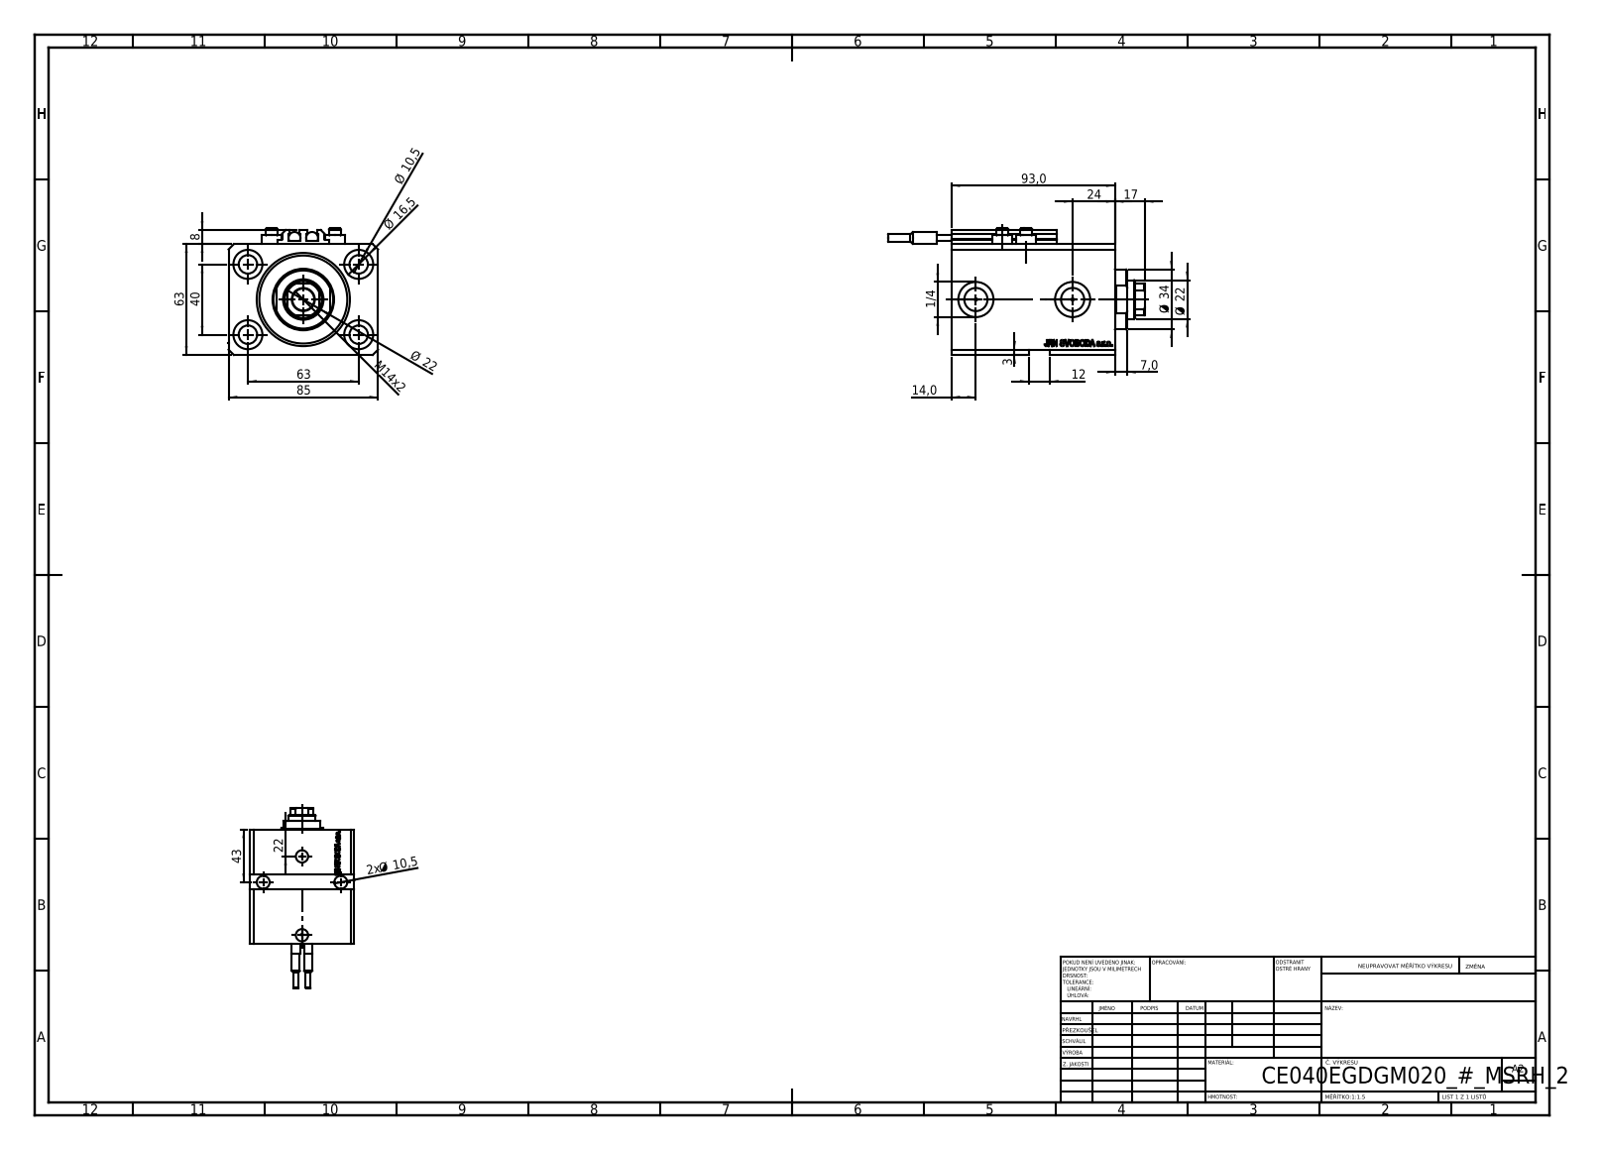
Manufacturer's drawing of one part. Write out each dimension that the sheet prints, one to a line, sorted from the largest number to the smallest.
93,0
85
63
63
43
40
Ø 34
24
Ø 22
Ø 22
22
17
Ø 16,5
M14x2
14,0
12
Ø 10,5
2x Ø 10,5
8
7,0
3
1/4
